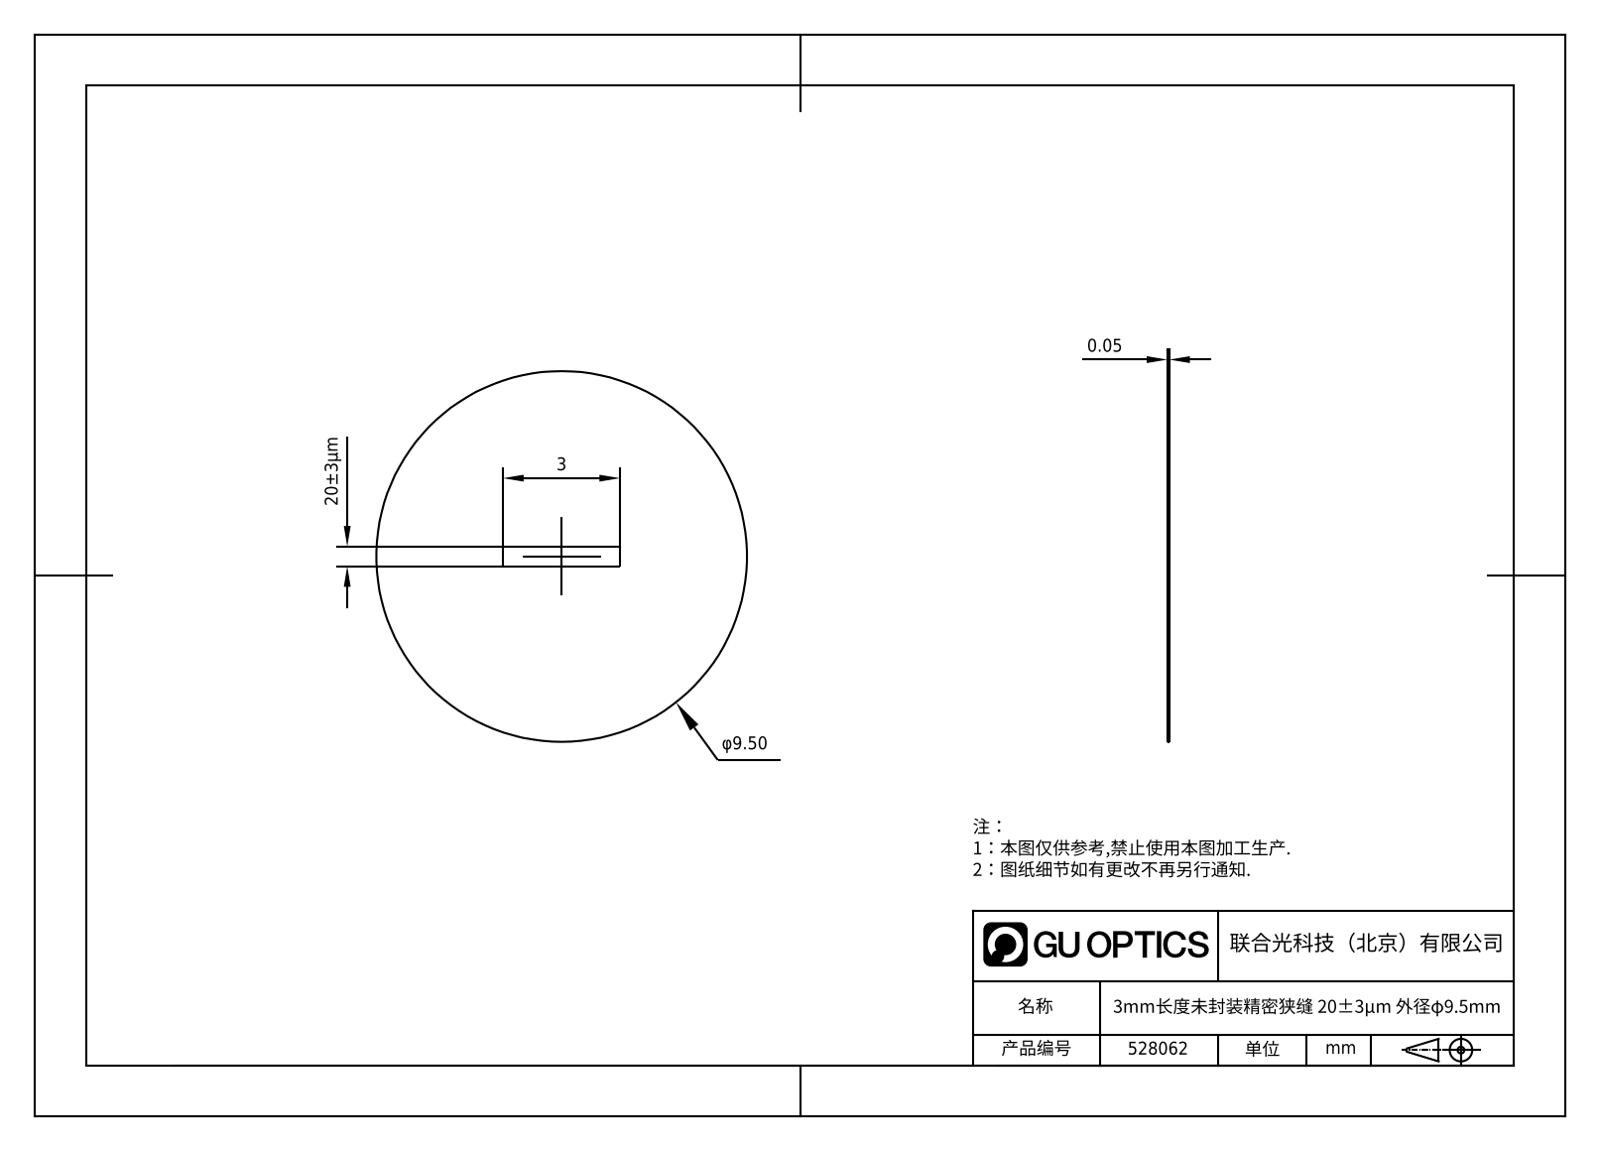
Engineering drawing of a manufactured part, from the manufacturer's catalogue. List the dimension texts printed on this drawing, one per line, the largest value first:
20±3μm
3
0.05
